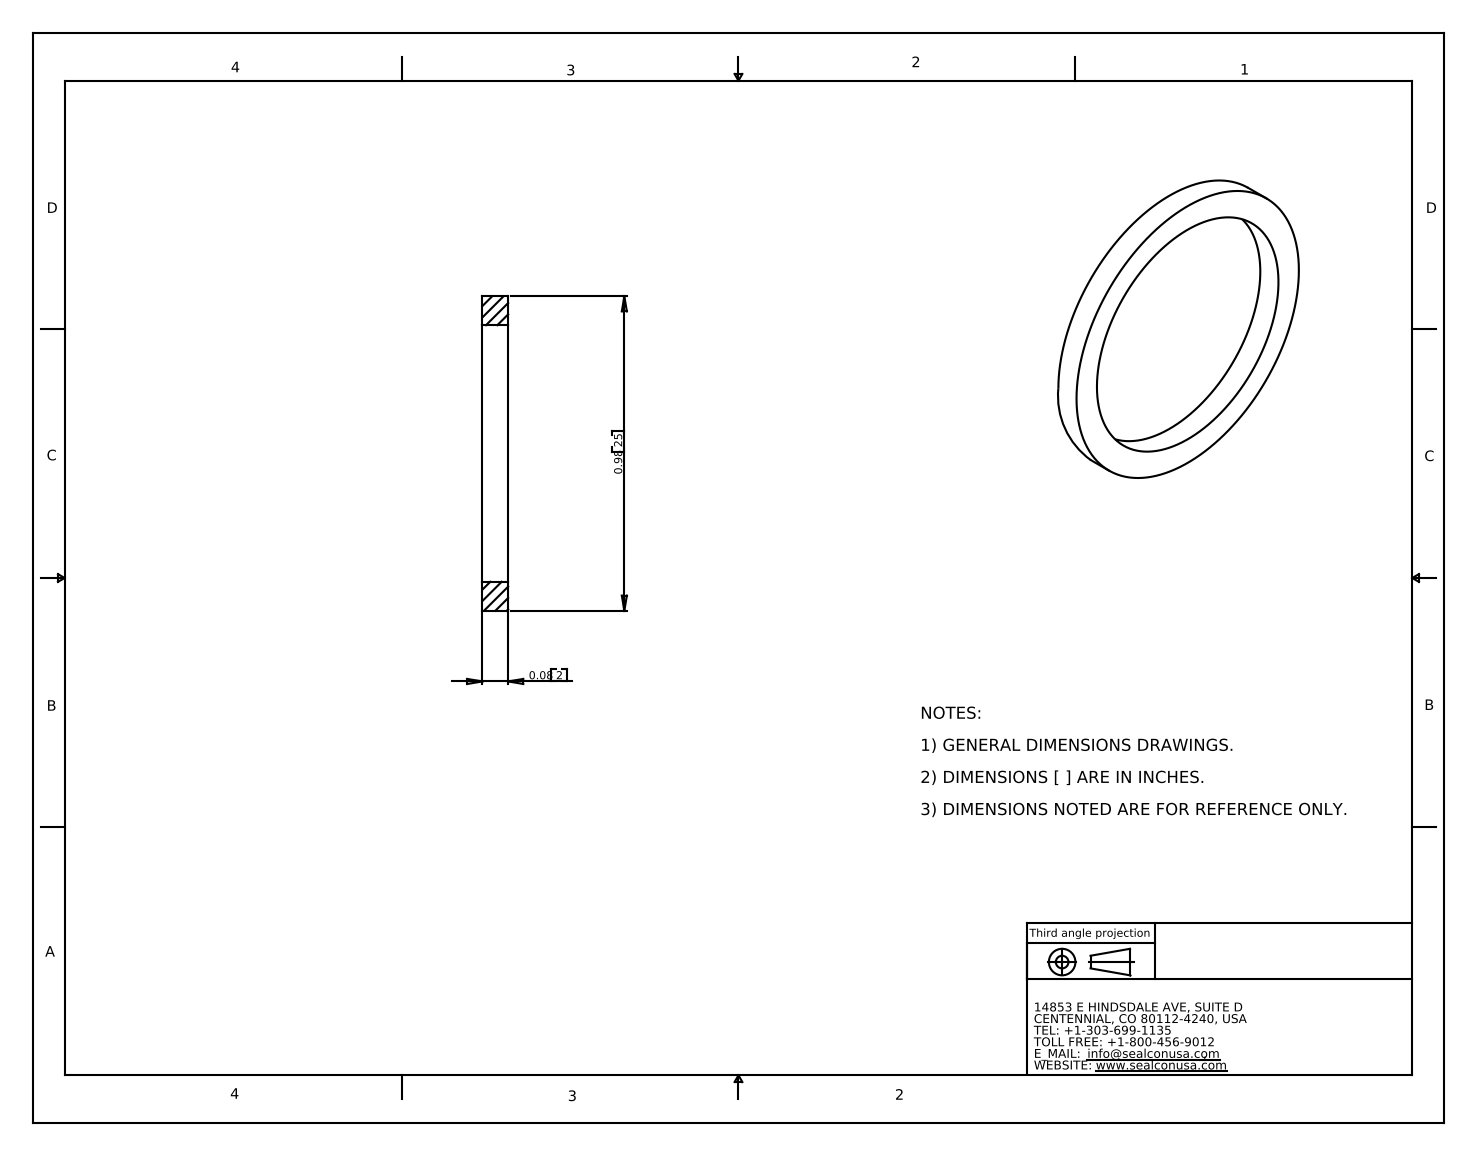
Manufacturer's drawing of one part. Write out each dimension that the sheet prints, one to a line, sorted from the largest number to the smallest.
0.98 25
0.08 2
